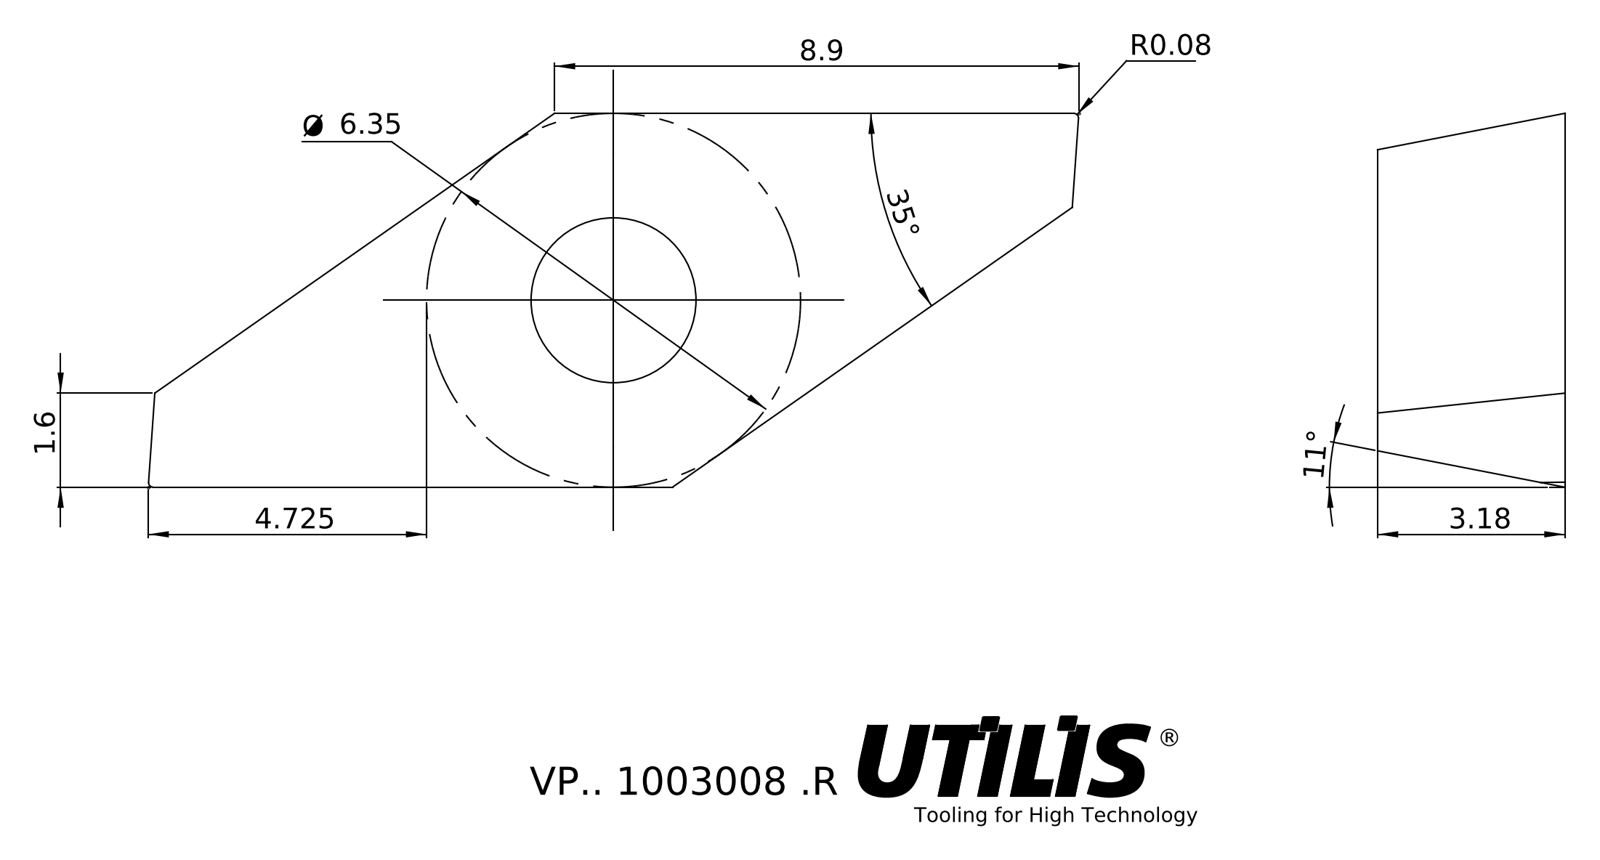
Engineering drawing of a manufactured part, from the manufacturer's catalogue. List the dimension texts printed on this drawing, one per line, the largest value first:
35°
11°
8.9
Ø 6.35
4.725
3.18
1.6
R0.08
